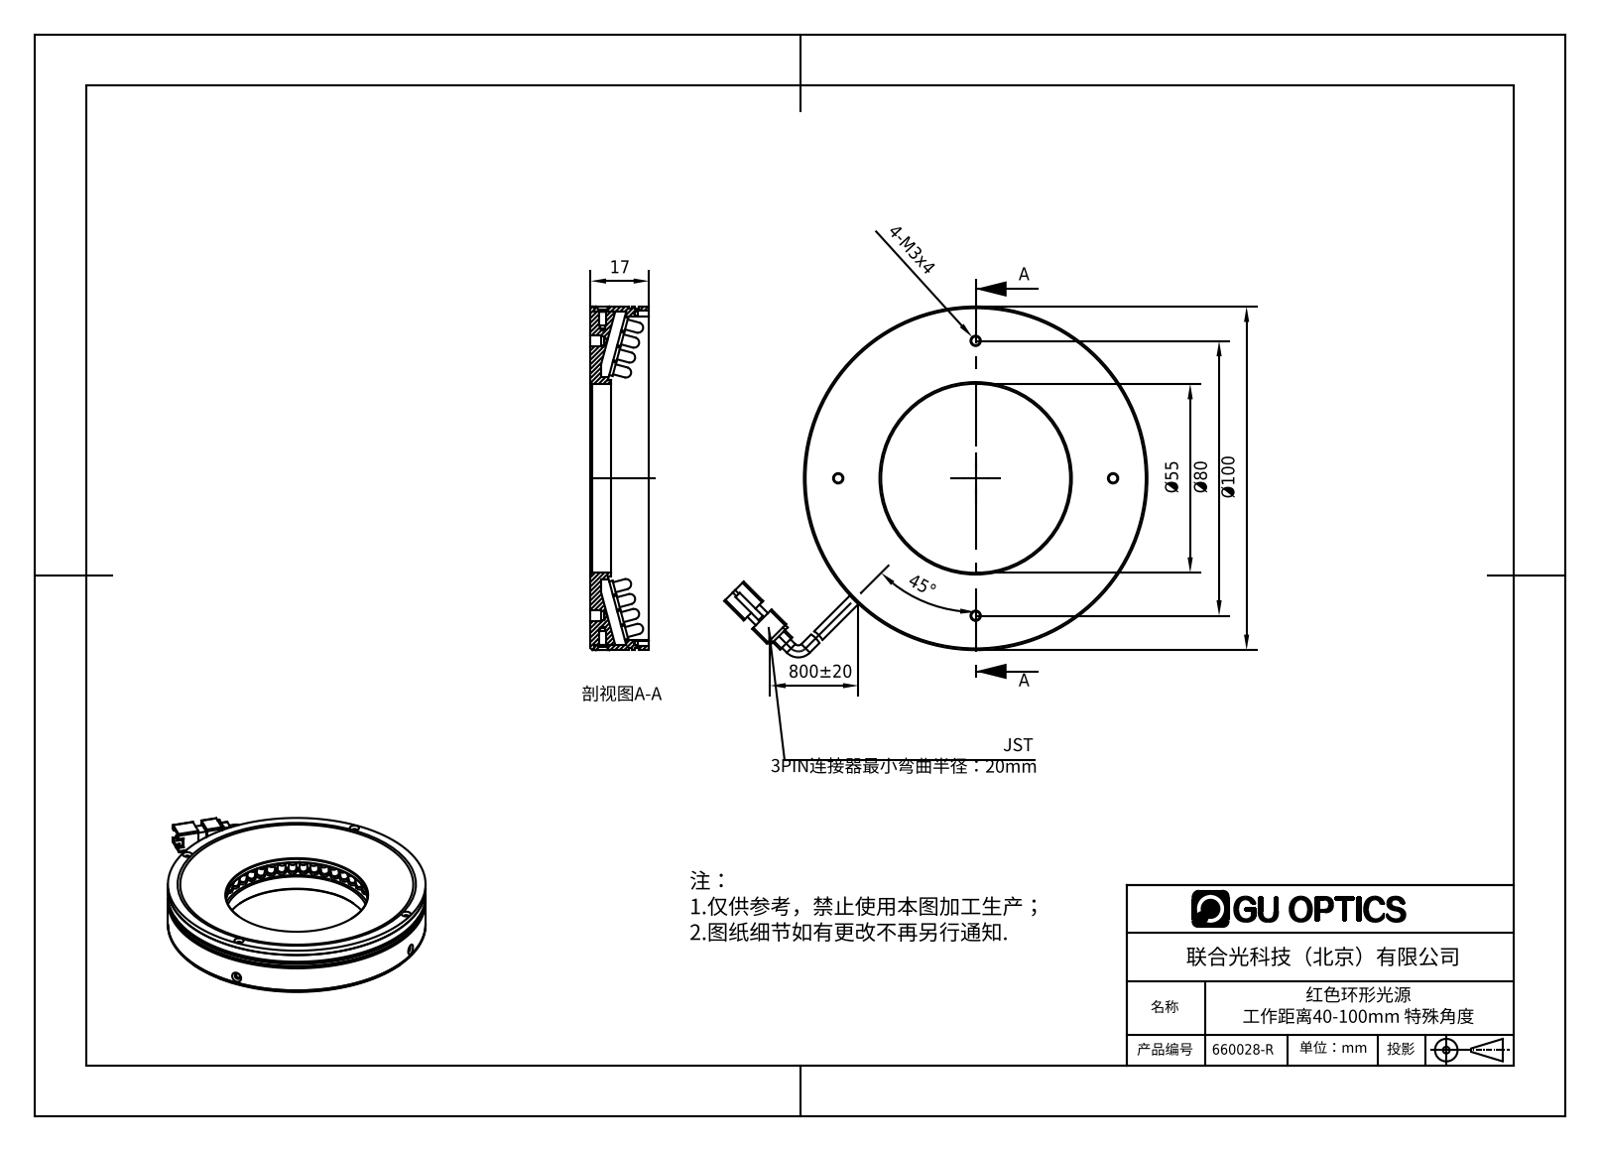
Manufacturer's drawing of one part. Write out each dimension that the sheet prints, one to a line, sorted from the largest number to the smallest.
800±20
Ø100
Ø80
Ø55
45°
17
4-M3x4
